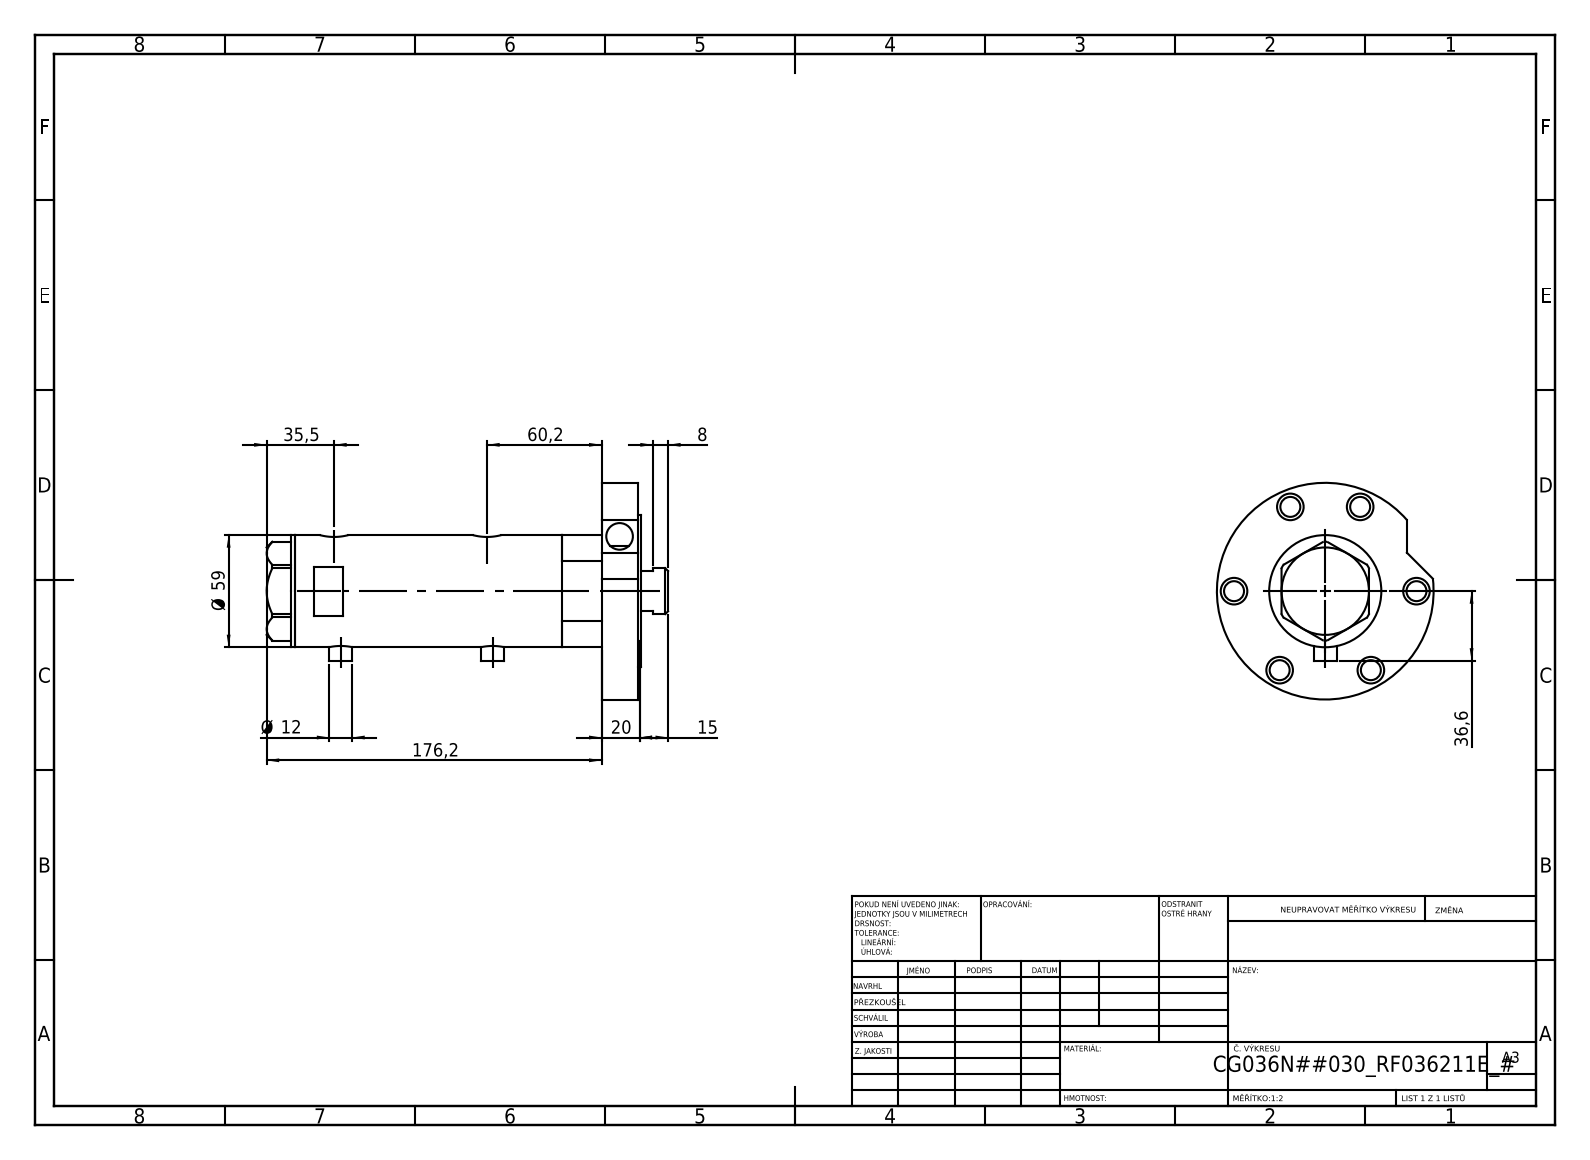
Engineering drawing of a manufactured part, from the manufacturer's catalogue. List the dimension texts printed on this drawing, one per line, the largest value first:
176,2
60,2
Ø 59
36,6
35,5
20
15
Ø 12
8
